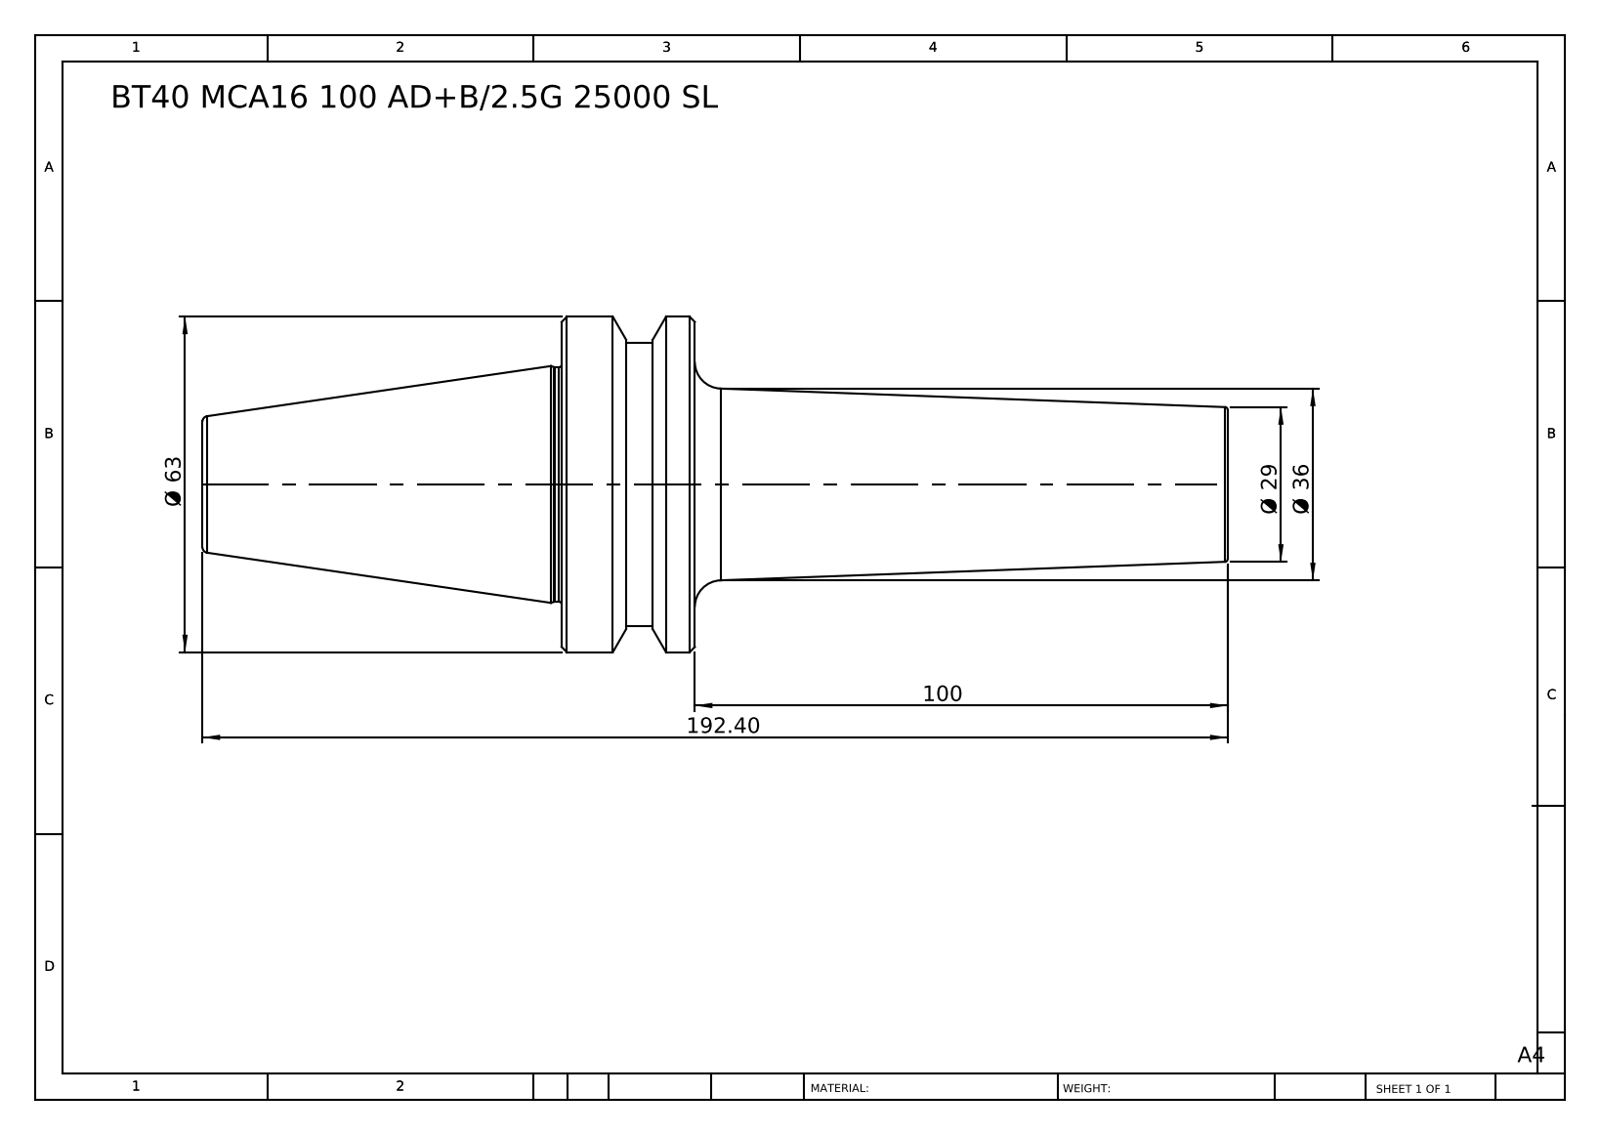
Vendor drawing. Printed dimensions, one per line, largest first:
192.40
100
Ø 63
Ø 36
Ø 29
